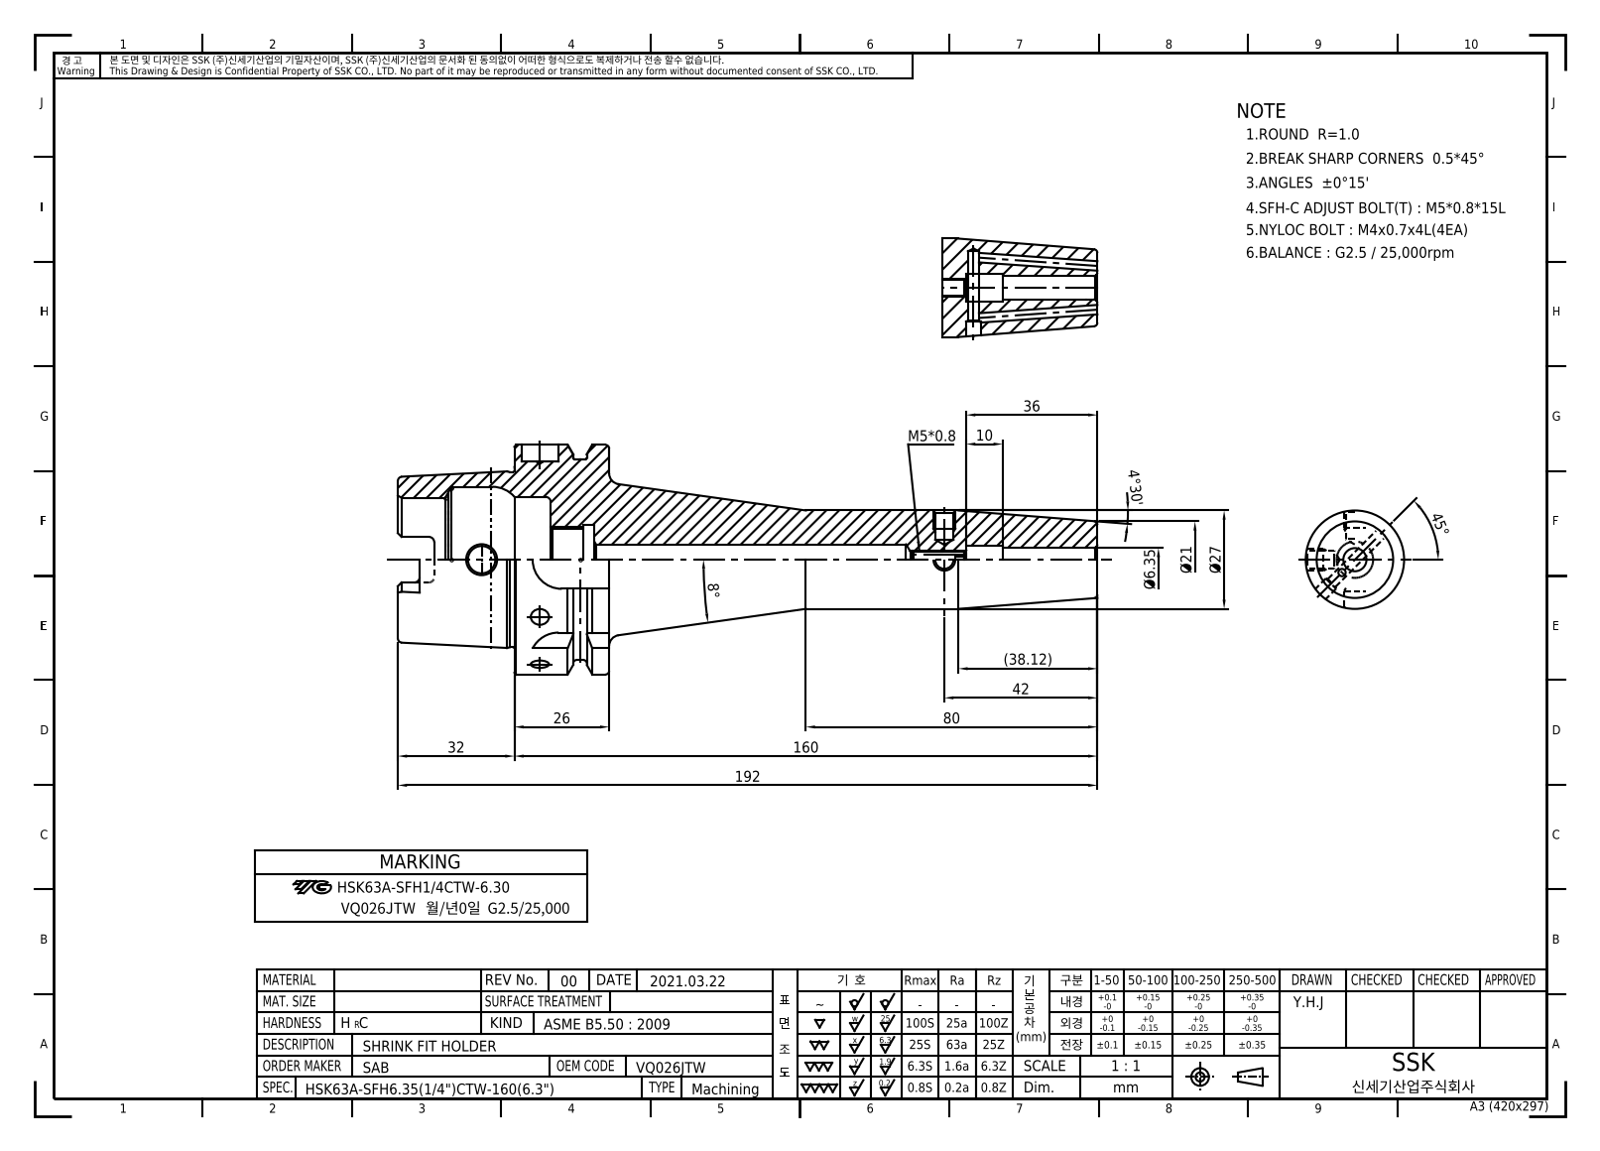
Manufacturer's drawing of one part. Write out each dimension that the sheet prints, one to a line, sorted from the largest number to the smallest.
192
160
80
45°
42
(38.12)
36
32
Ø27
26
Ø21
10
8°
Ø6.35
4°30'
